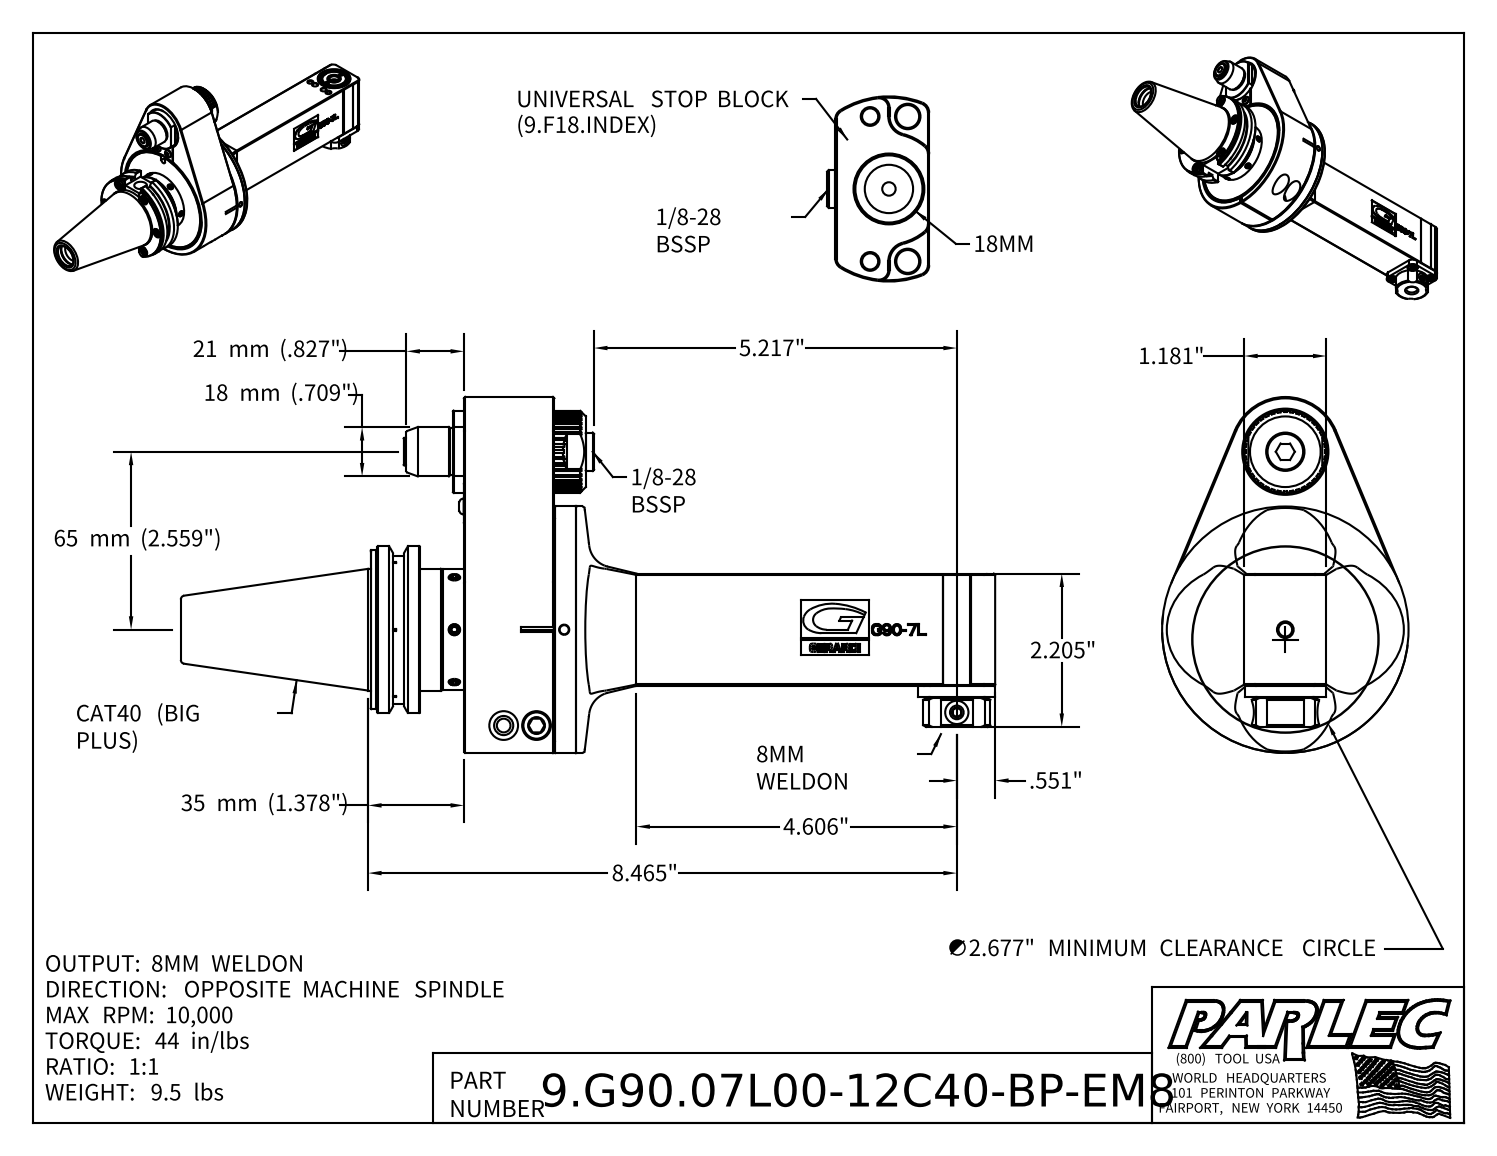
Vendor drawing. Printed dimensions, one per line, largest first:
65 mm (2.559")
35 mm (1.378")
21 mm (.827")
18 mm (.709")
8.465"
5.217"
4.606"
∅2.677" MINIMUM CLEARANCE CIRCLE
2.205"
1.181"
.551"
